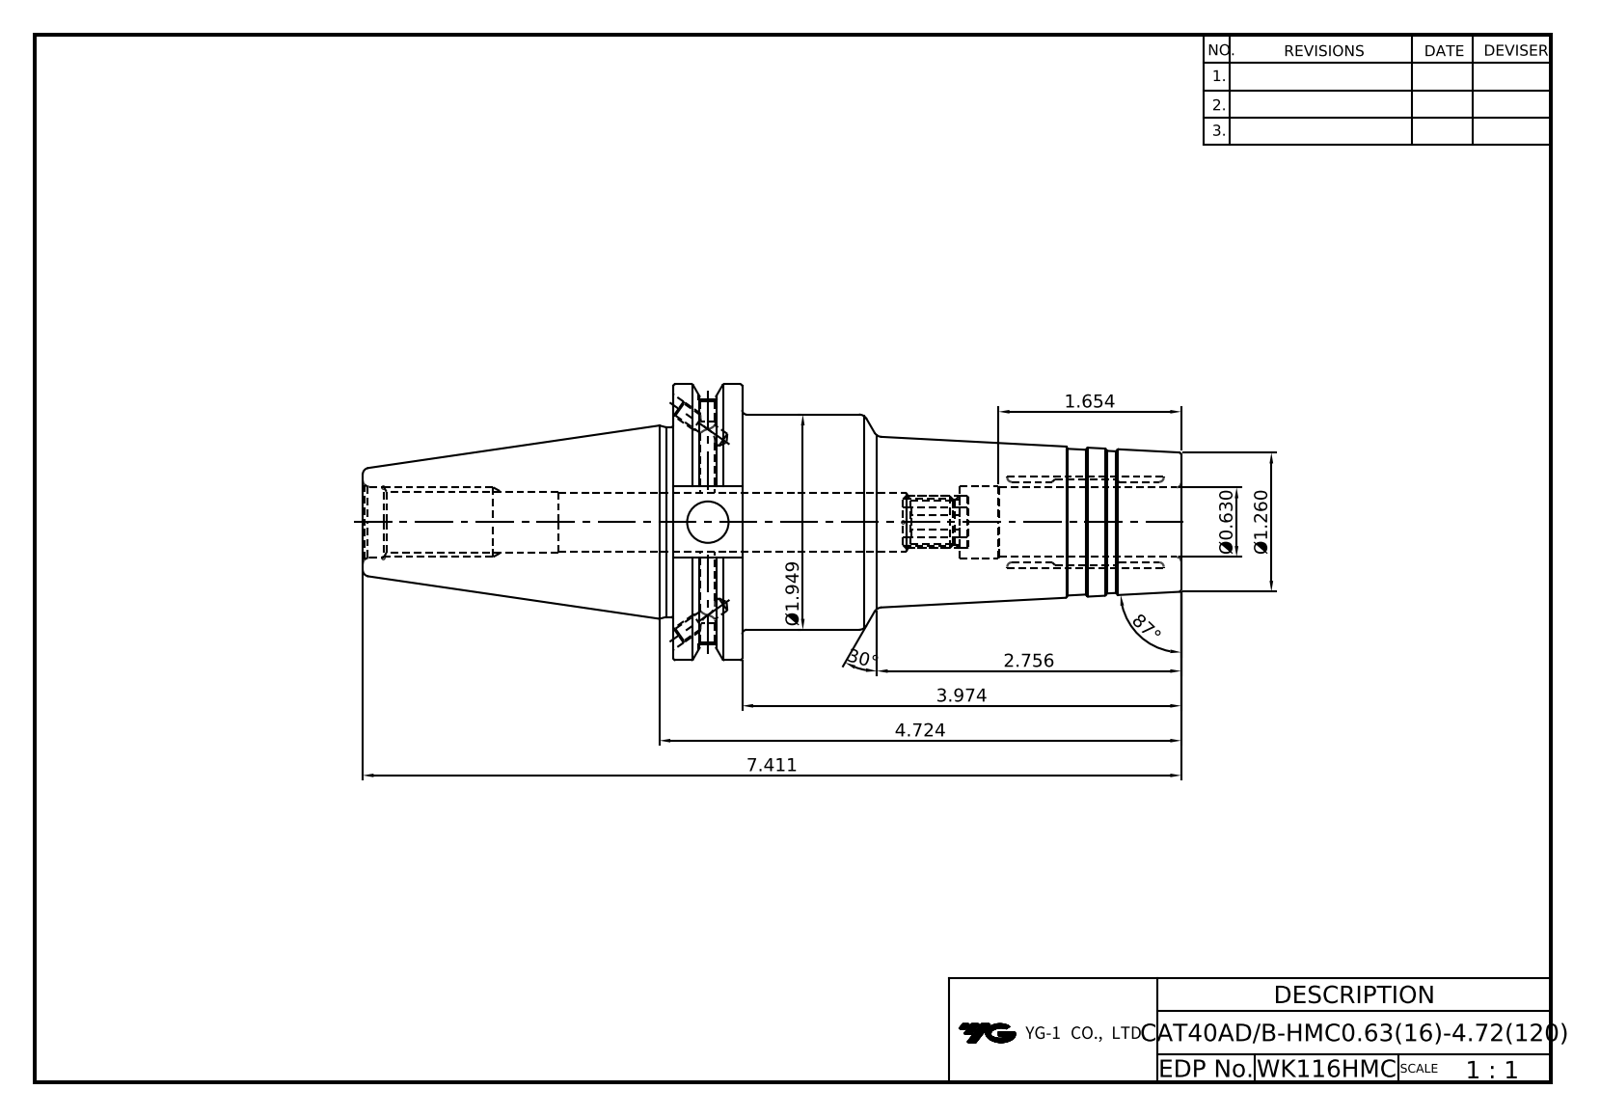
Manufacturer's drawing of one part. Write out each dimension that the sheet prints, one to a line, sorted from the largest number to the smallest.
87°
30°
7.411
4.724
3.974
2.756
Ø1.949
1.654
Ø1.260
Ø0.630
